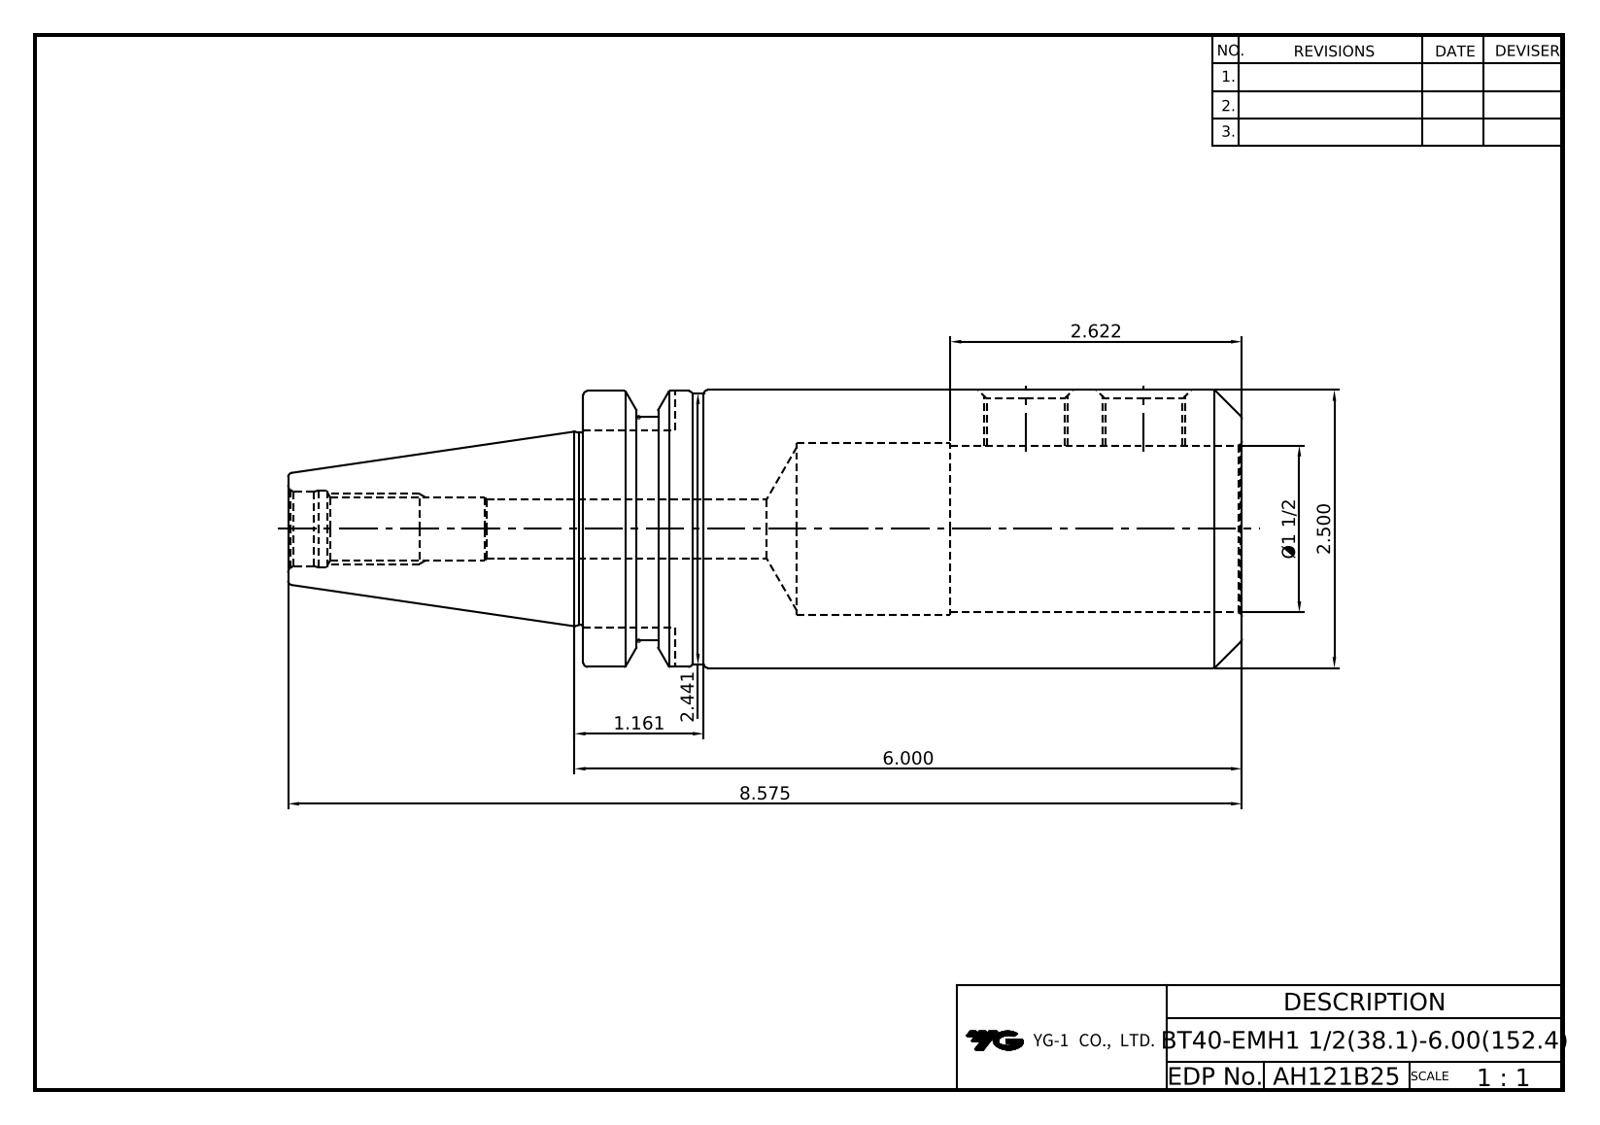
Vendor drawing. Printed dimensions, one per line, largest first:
8.575
6.000
2.622
2.500
2.441
Ø1 1/2
1.161
